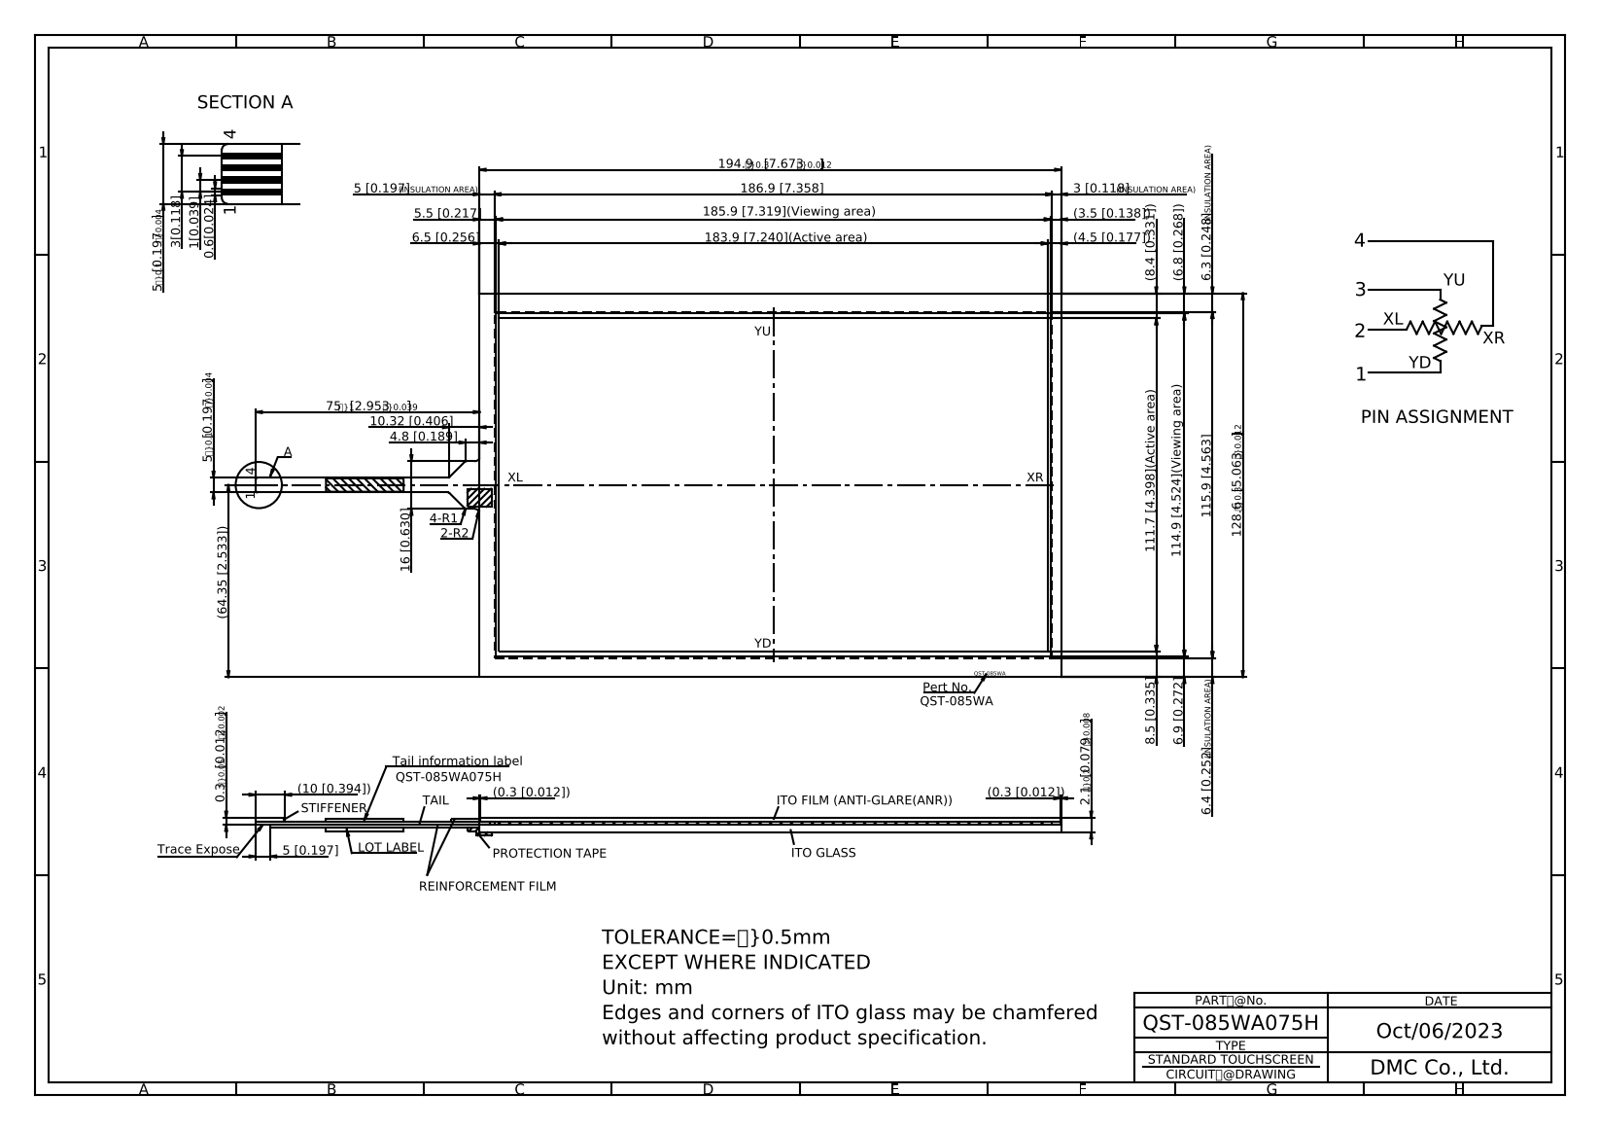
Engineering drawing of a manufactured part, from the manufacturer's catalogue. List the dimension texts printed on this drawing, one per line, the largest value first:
194.90
186.9 [7.358]
185.9 [7.319](Viewing area)
183.9 [7.240](Active area)
128.60
115.9 [4.563]
114.9 [4.524](Viewing area)
111.7 [4.398](Active area)
75.00
(64.35 [2.533])
16 [0.630]
10.32 [0.406]
(10 [0.394])
8.5 [0.335]
(8.4 [0.331])
6.9 [0.272]
(6.8 [0.268])
6.5 [0.256]
6.40{\H0.6563x;(INSULATION AREA)}
6.30{\H0.6563x;(INSULATION AREA)}
5.5 [0.217]
5.00{\H0.6563x;(INSULATION AREA)}
5 [0.197]
5.00
5{\H0.6667x;?}0.1}[0.197{\H0.6667x;?}0.004}]
4.8 [0.189]
(4.5 [0.177])
(3.5 [0.138])
3.00{\H0.6563x;(INSULATION AREA)}
3[0.118]
2.1{\H0.6667x;?}0.2}[0.079{\H0.6667x;?}0.008}]
1[0.039]
0.6[0.024]
(0.3 [0.012])
(0.3 [0.012])
0.3{\H0.6667x;?}0.05}[0.012{\H0.6667x;?}0.002}]
